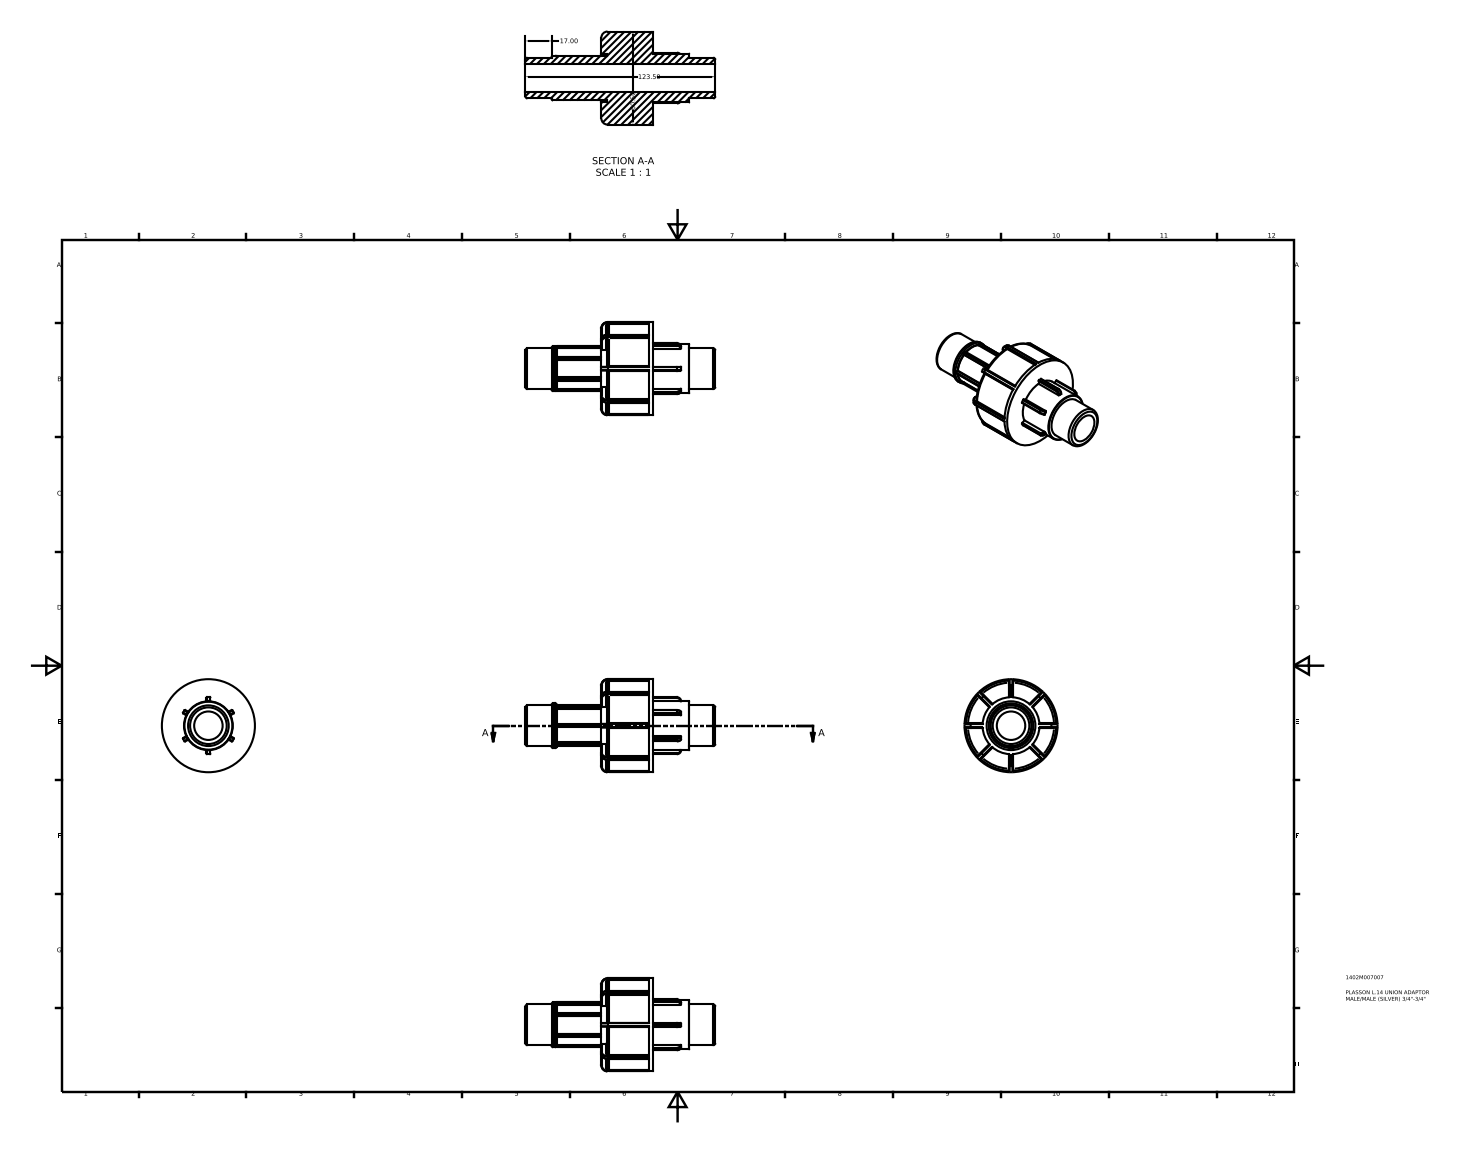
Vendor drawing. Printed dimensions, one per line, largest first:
123.50
60.50
17.00
